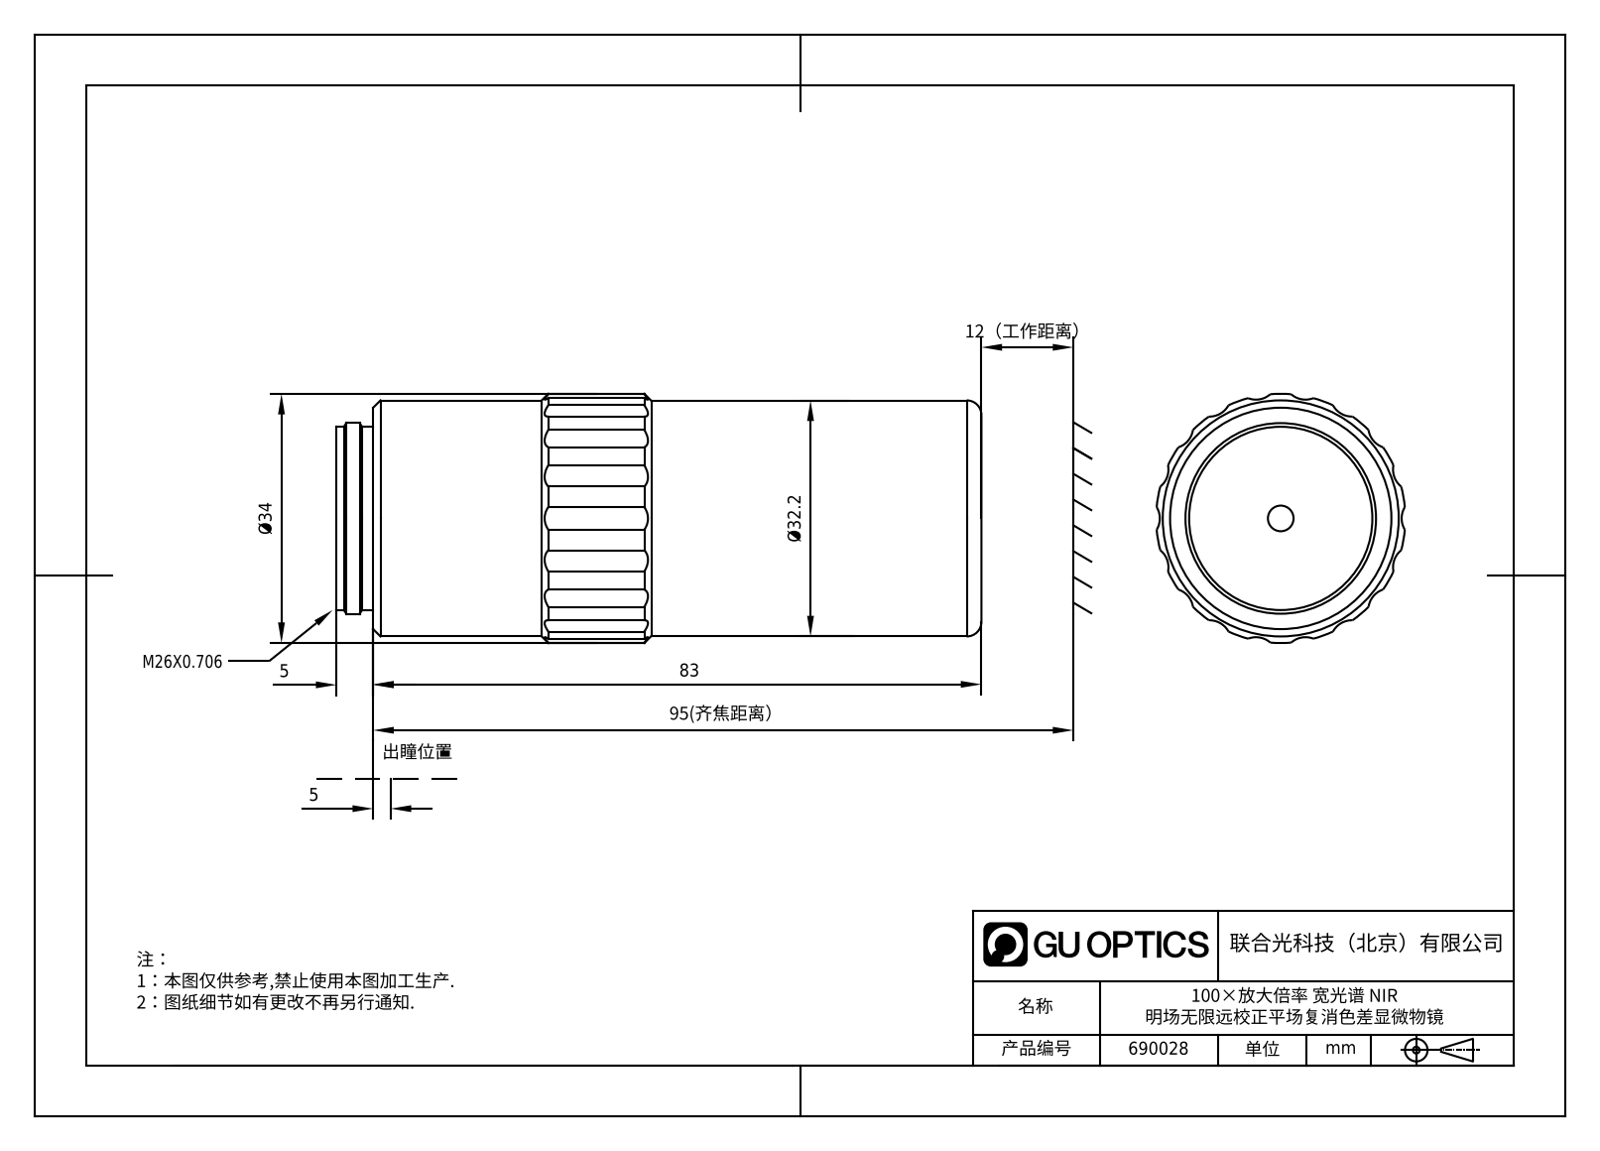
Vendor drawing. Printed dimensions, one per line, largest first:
95(齐焦距离）
83
Ø34
Ø32.2
12（工作距离）
5
5
